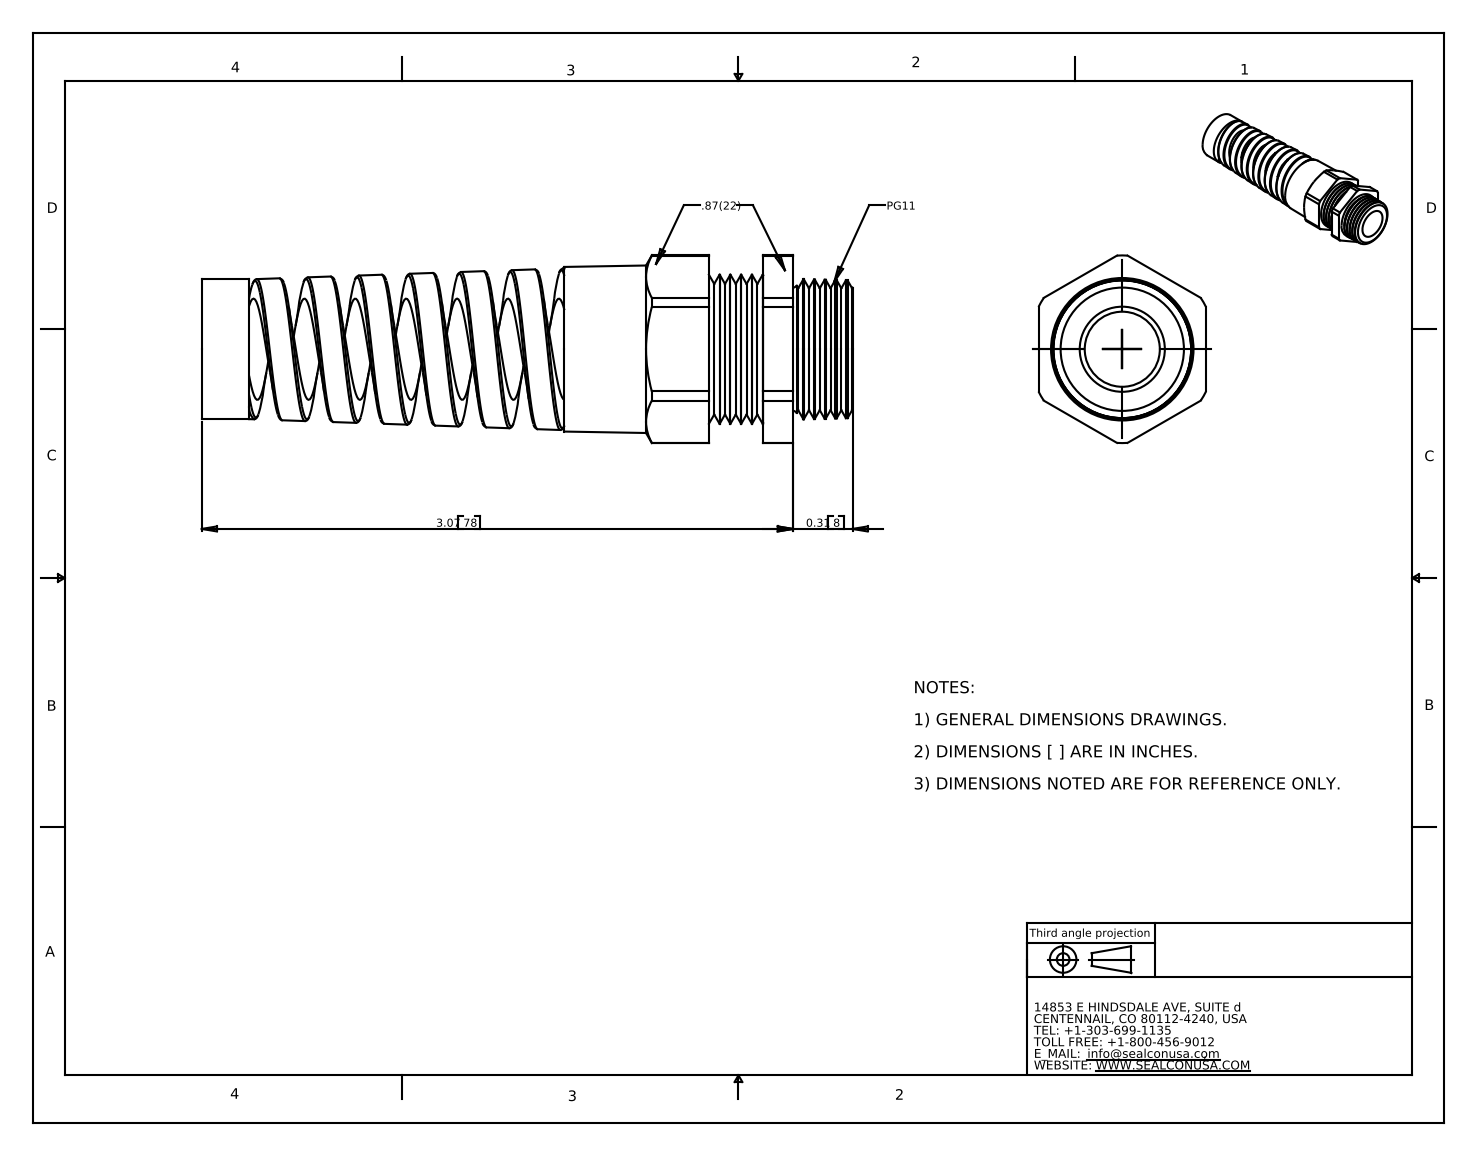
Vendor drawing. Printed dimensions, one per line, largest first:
3.07 78
0.31 8
